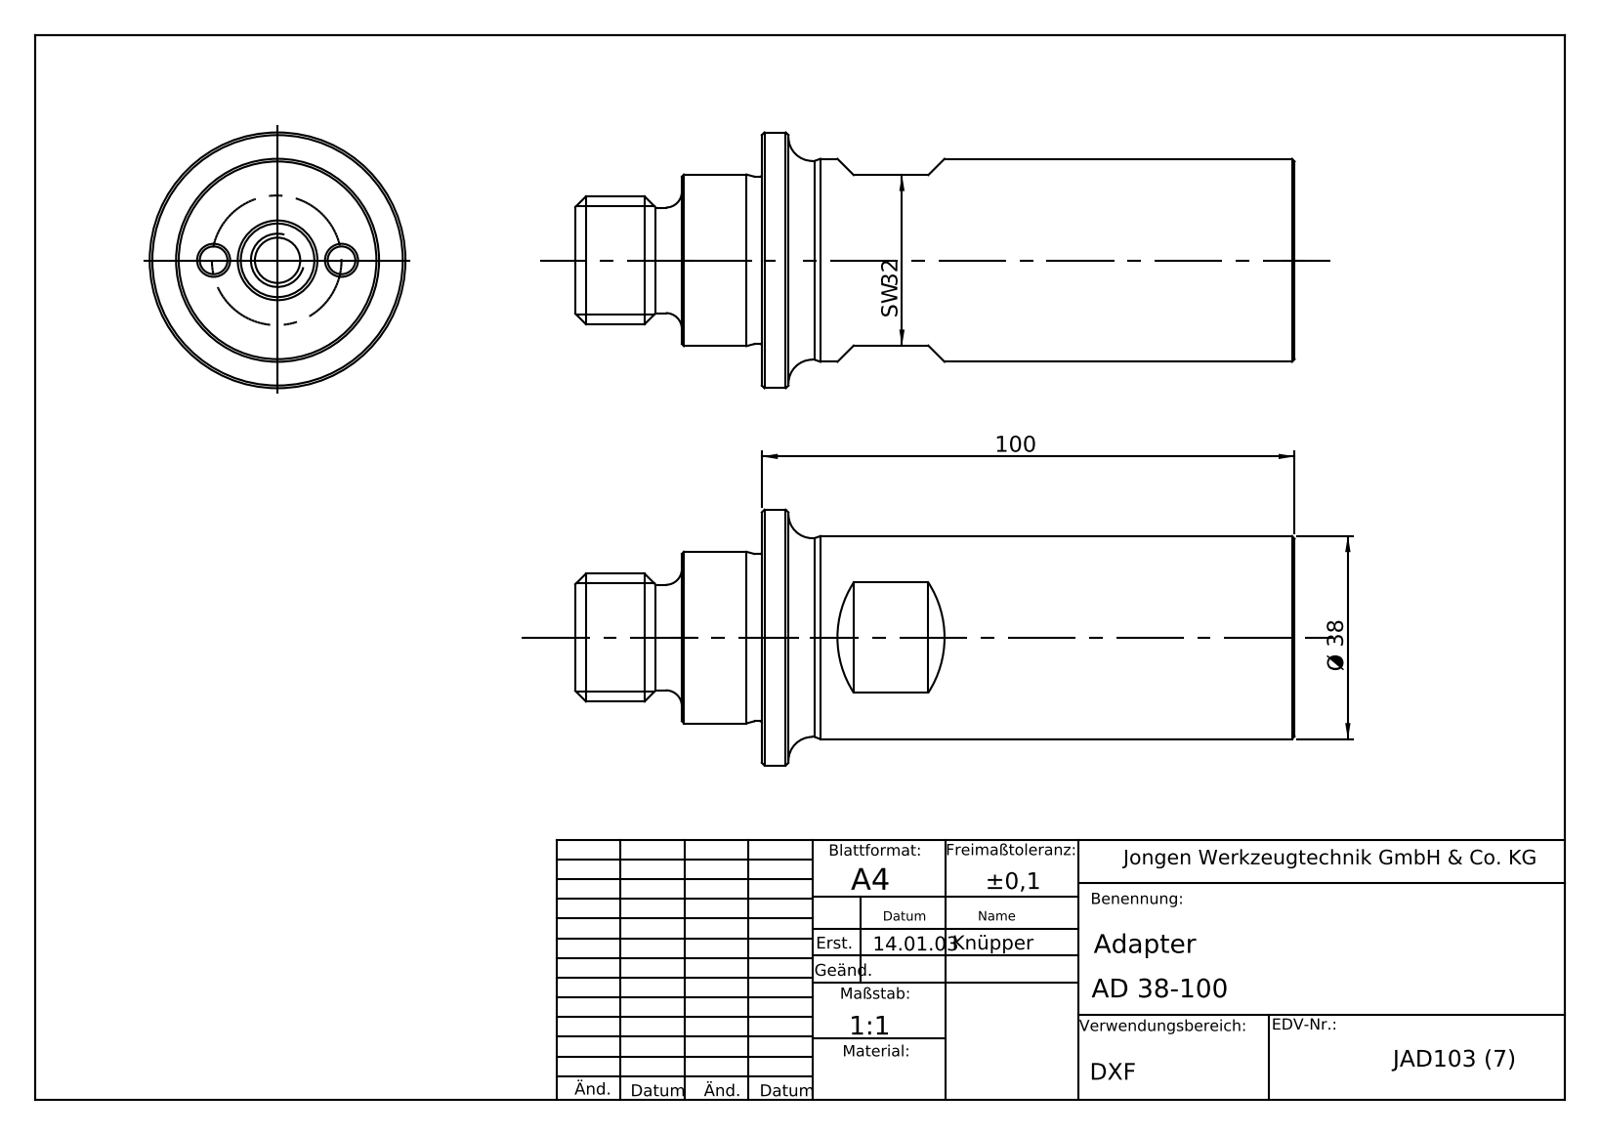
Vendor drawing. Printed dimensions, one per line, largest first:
100
Ø 38
SW 32
